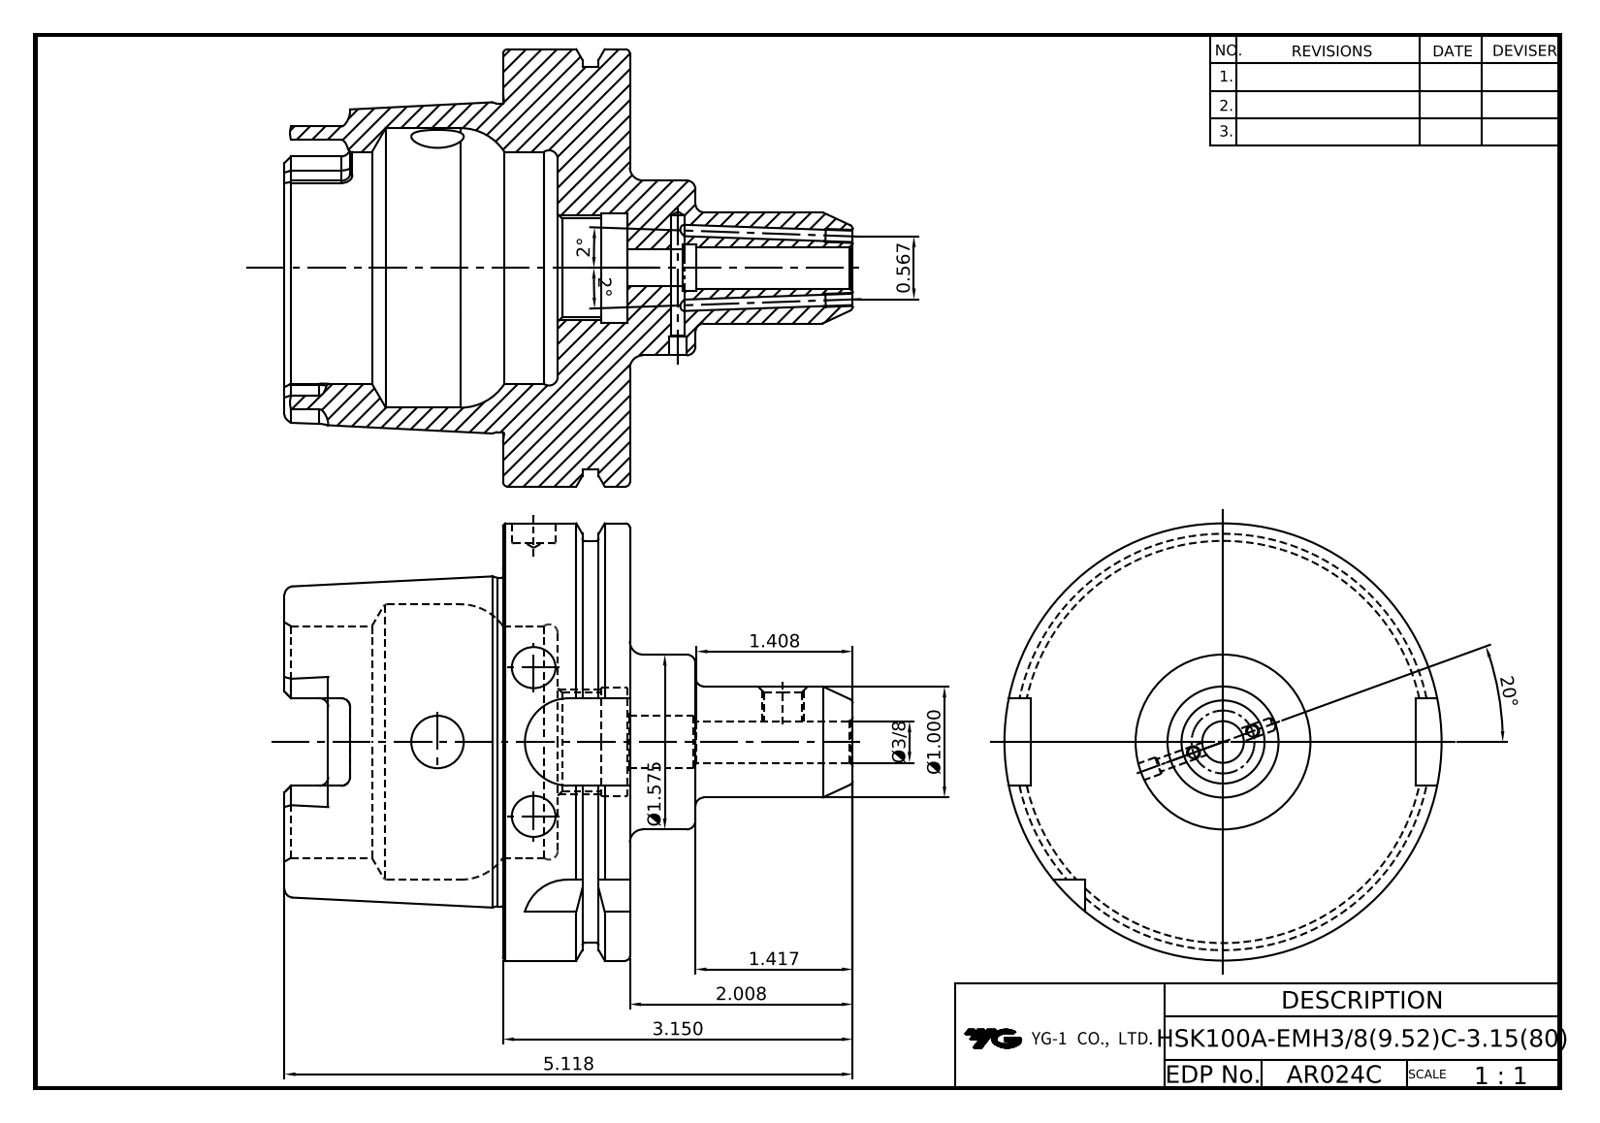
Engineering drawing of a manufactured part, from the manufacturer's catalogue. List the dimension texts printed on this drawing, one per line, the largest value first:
20°
5.118
3.150
2.008
2°
2°
Ø1.575
1.417
1.408
Ø1.000
0.567
Ø3/8
